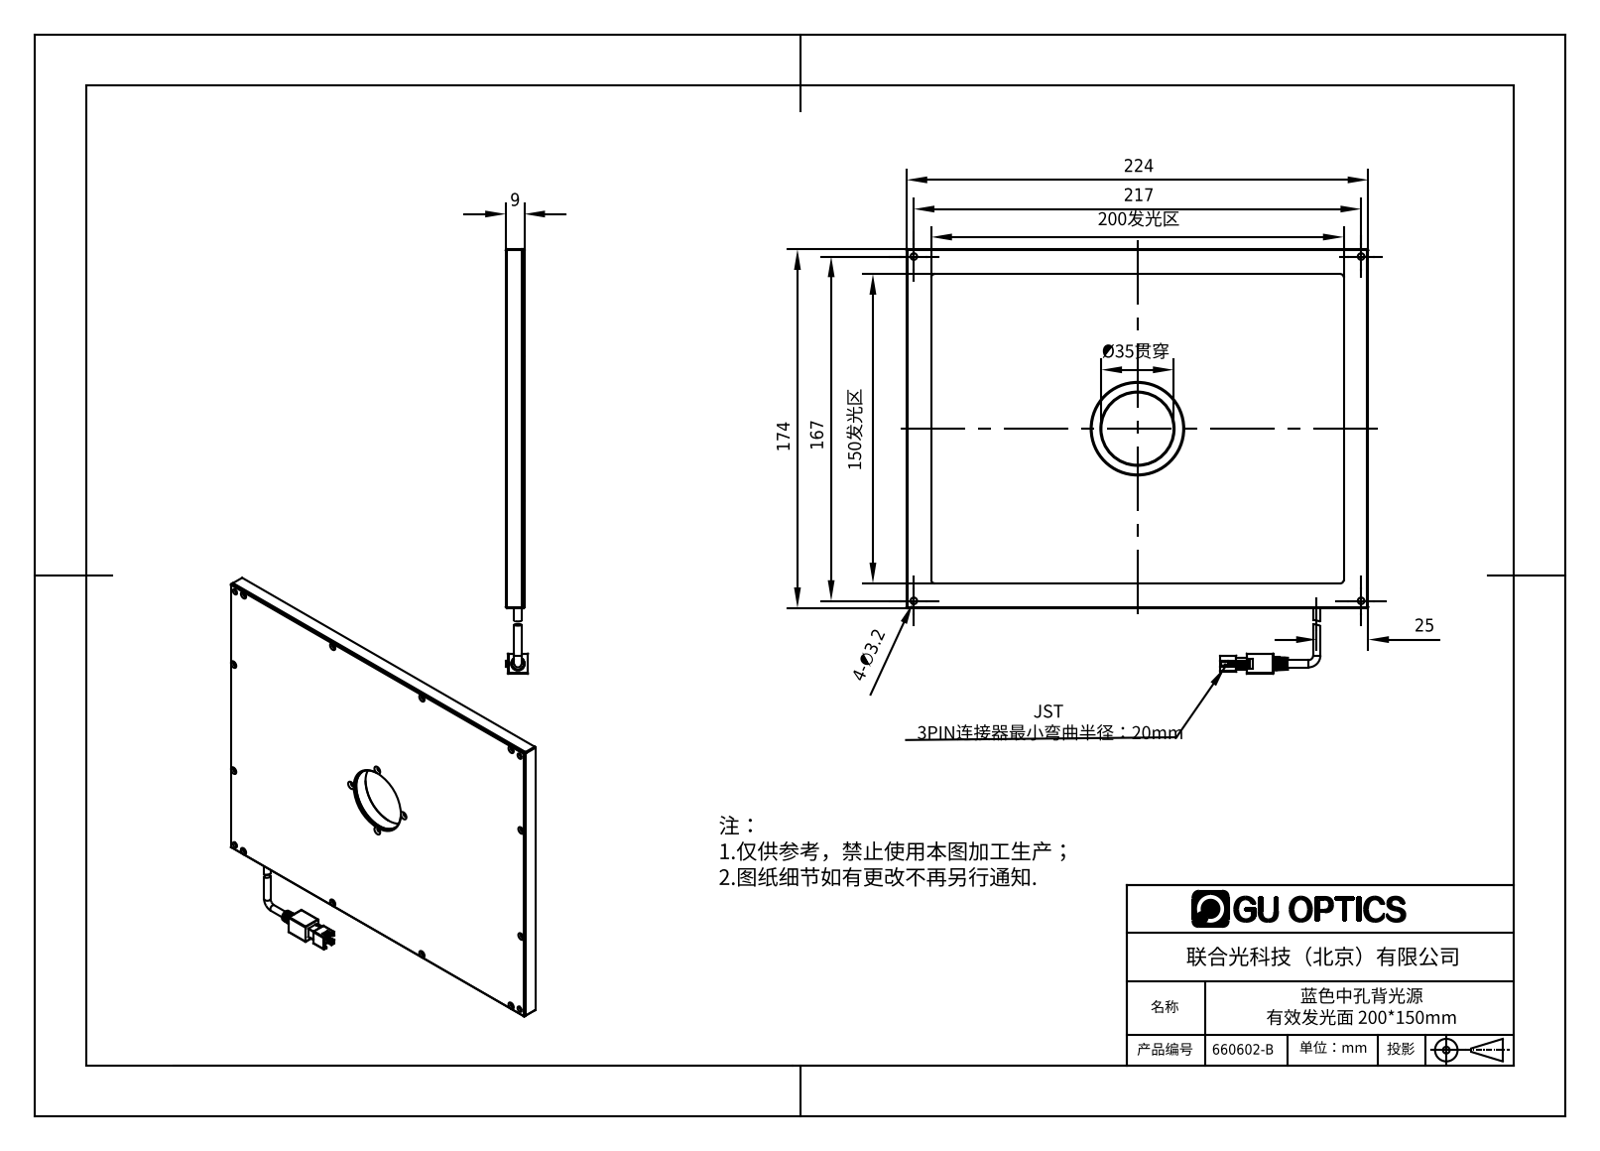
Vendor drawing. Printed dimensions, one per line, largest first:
224
217
200发光区
174
167
150发光区
Ø35贯穿
25
9
4-∅3.2
